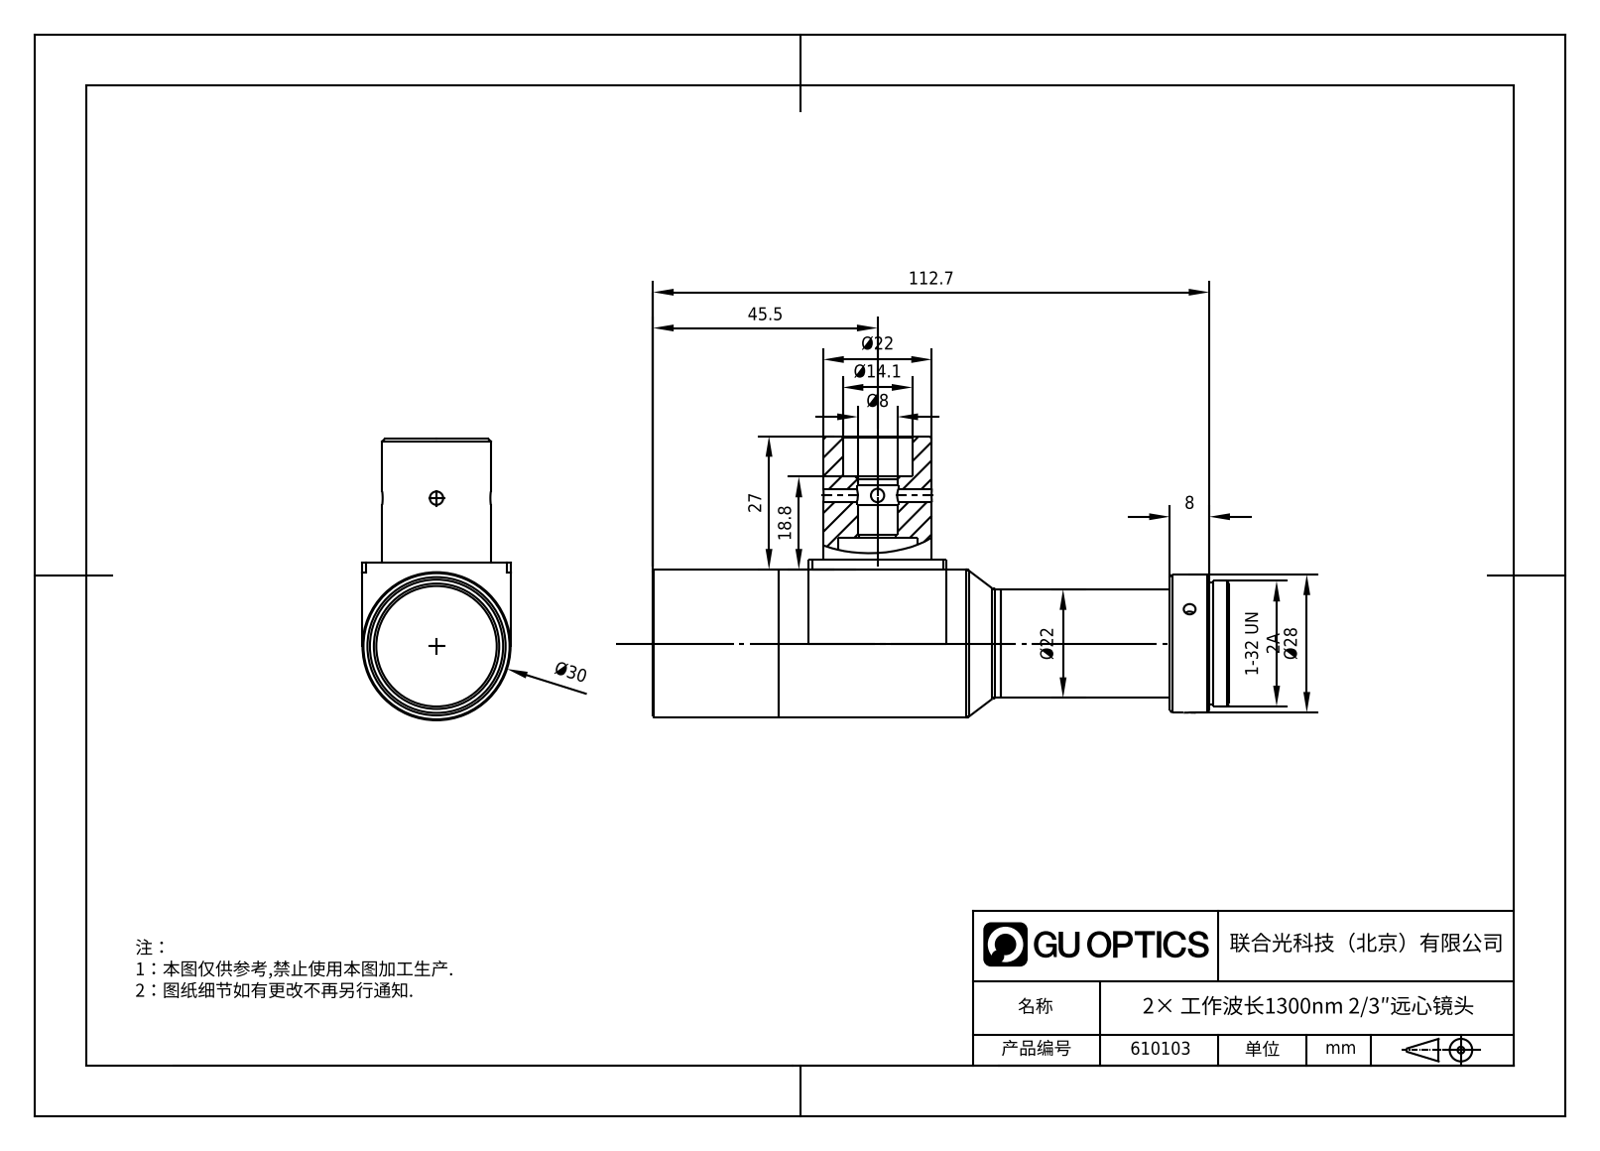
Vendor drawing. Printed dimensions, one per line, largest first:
112.7
45.5
Ø30
Ø28
27
Ø22
Ø22
18.8
Ø14.1
8
Ø8
1-32 UN 2A
